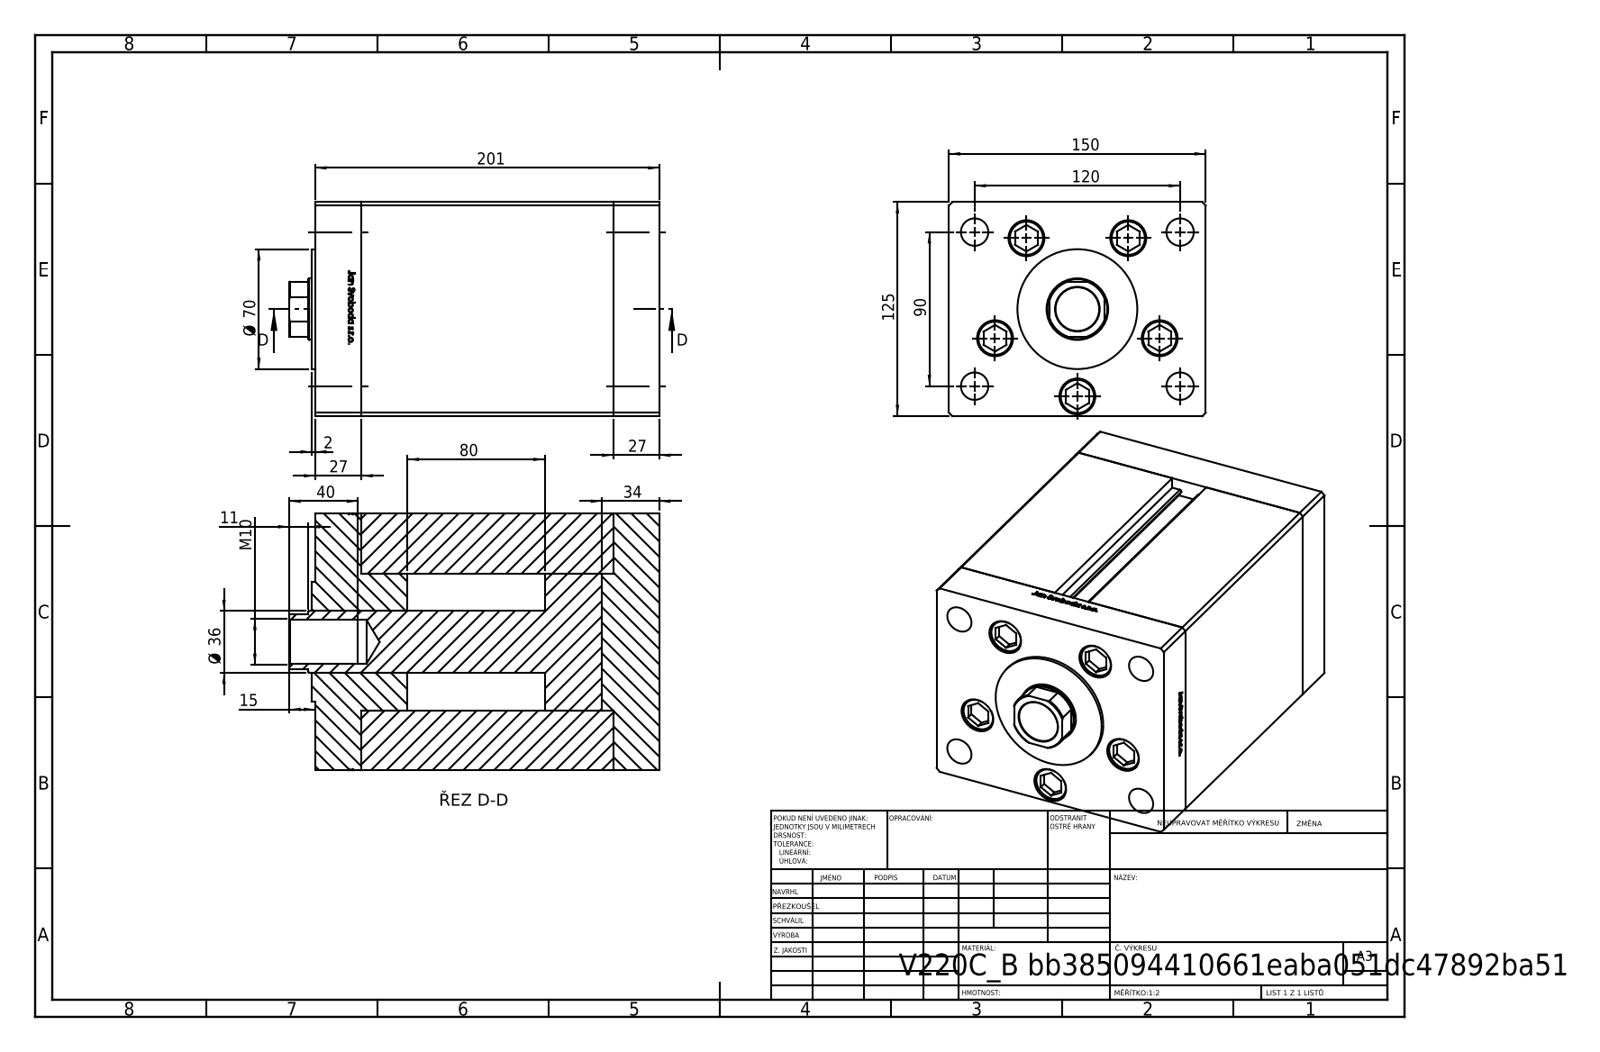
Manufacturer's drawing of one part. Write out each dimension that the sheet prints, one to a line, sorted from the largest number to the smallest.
201
150
125
120
90
80
Ø 70
40
Ø 36
34
27
27
15
11
M10
2
